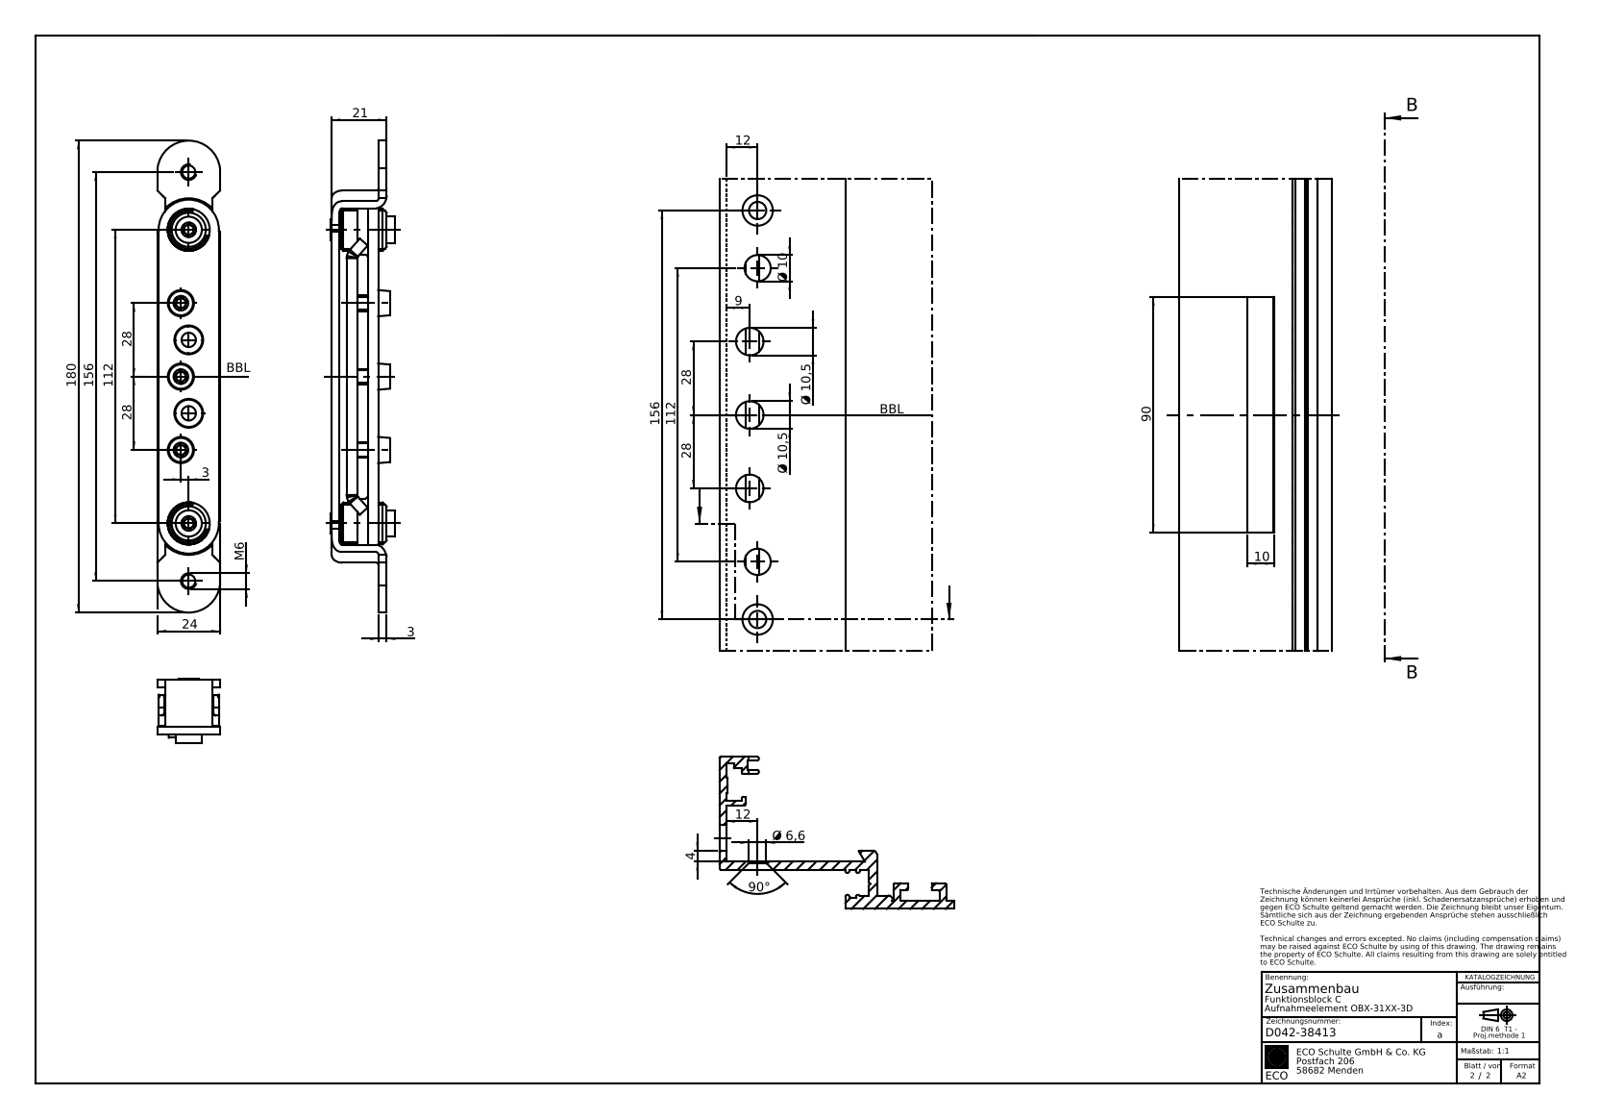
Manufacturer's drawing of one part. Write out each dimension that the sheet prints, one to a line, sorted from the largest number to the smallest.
180
156
156
112
112
90
90°
28
28
28
28
24
21
12
12
Ø 10,5
Ø 10,5
10
Ø 10
9
Ø 6,6
M6
4
3
3
